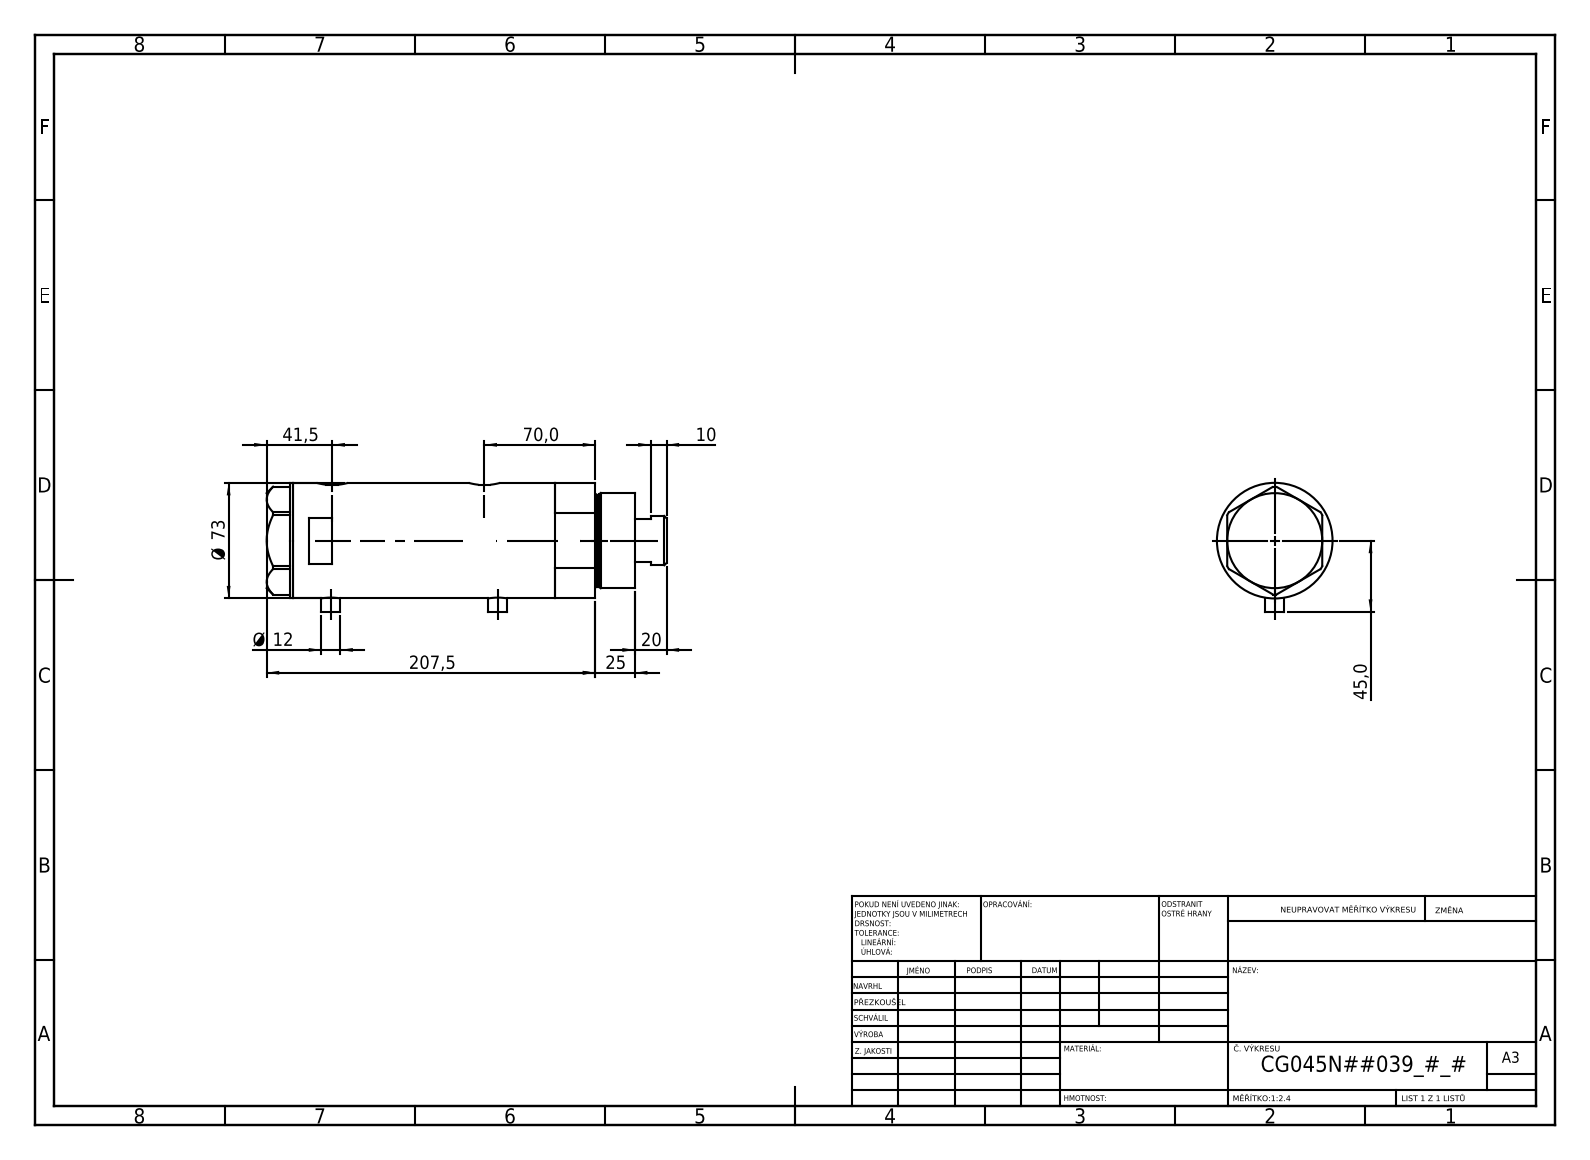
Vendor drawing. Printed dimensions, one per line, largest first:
207,5
Ø 73
70,0
45,0
41,5
25
20
Ø 12
10
